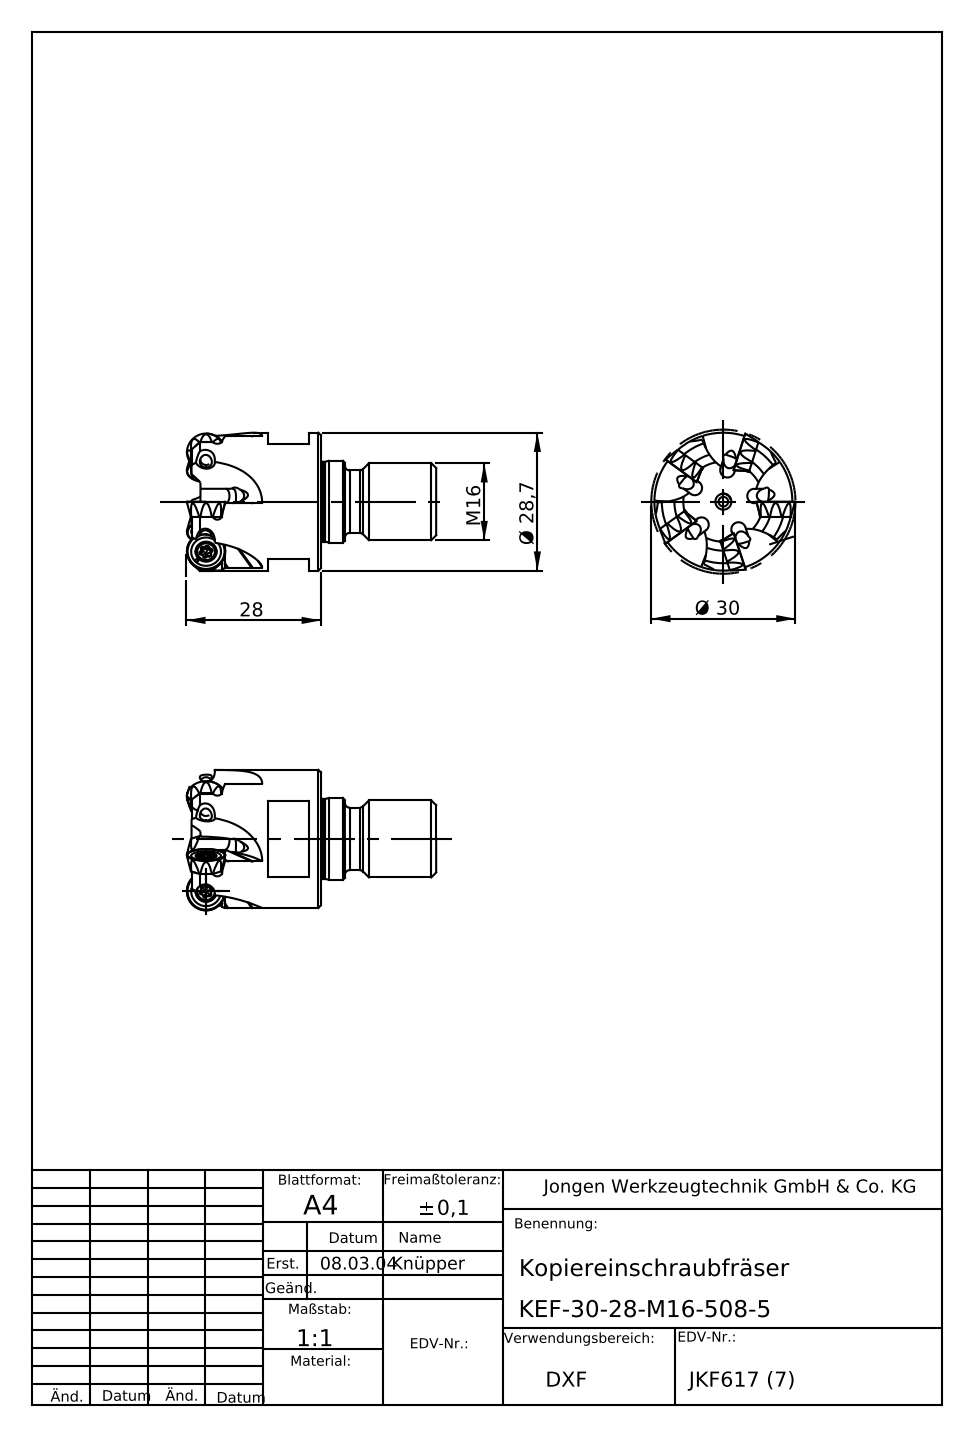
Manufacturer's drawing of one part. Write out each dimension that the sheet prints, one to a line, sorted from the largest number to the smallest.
Ø 30
Ø 28,7
28
M 16
